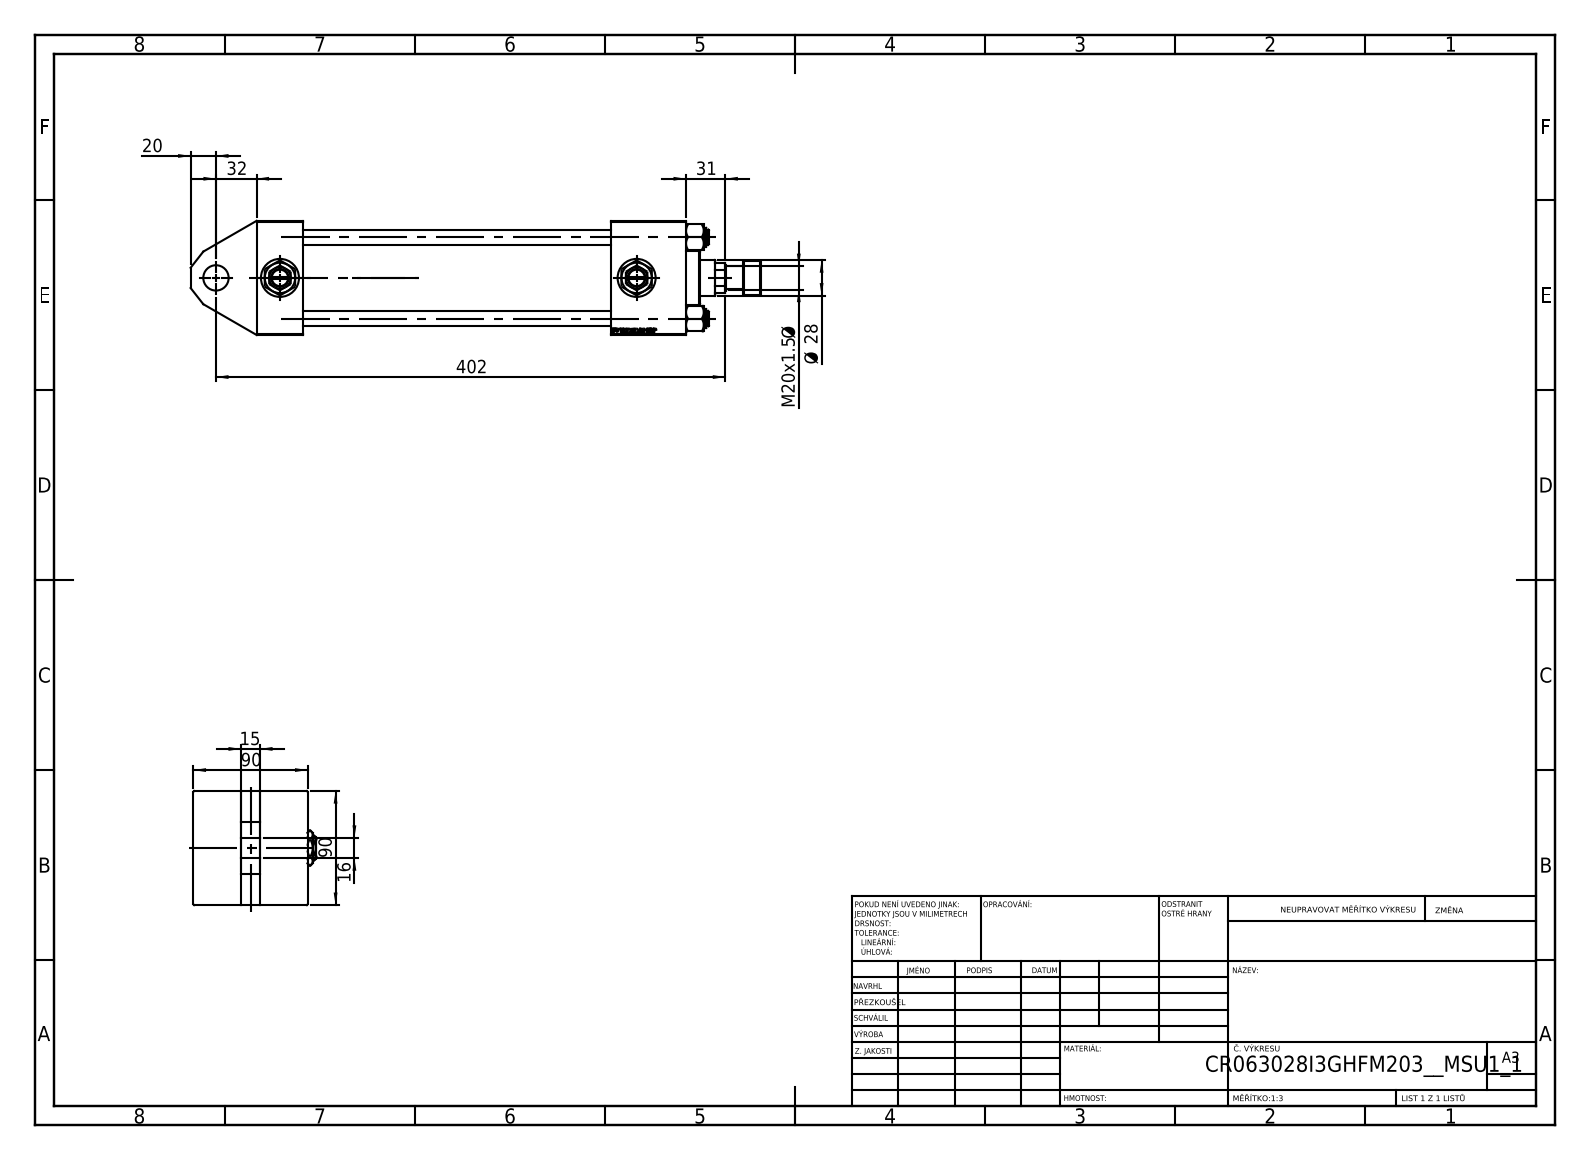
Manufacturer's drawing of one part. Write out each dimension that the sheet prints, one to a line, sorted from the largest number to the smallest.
402
90
90
32
31
Ø 28
M20x1.5 Ø
20
16
15
